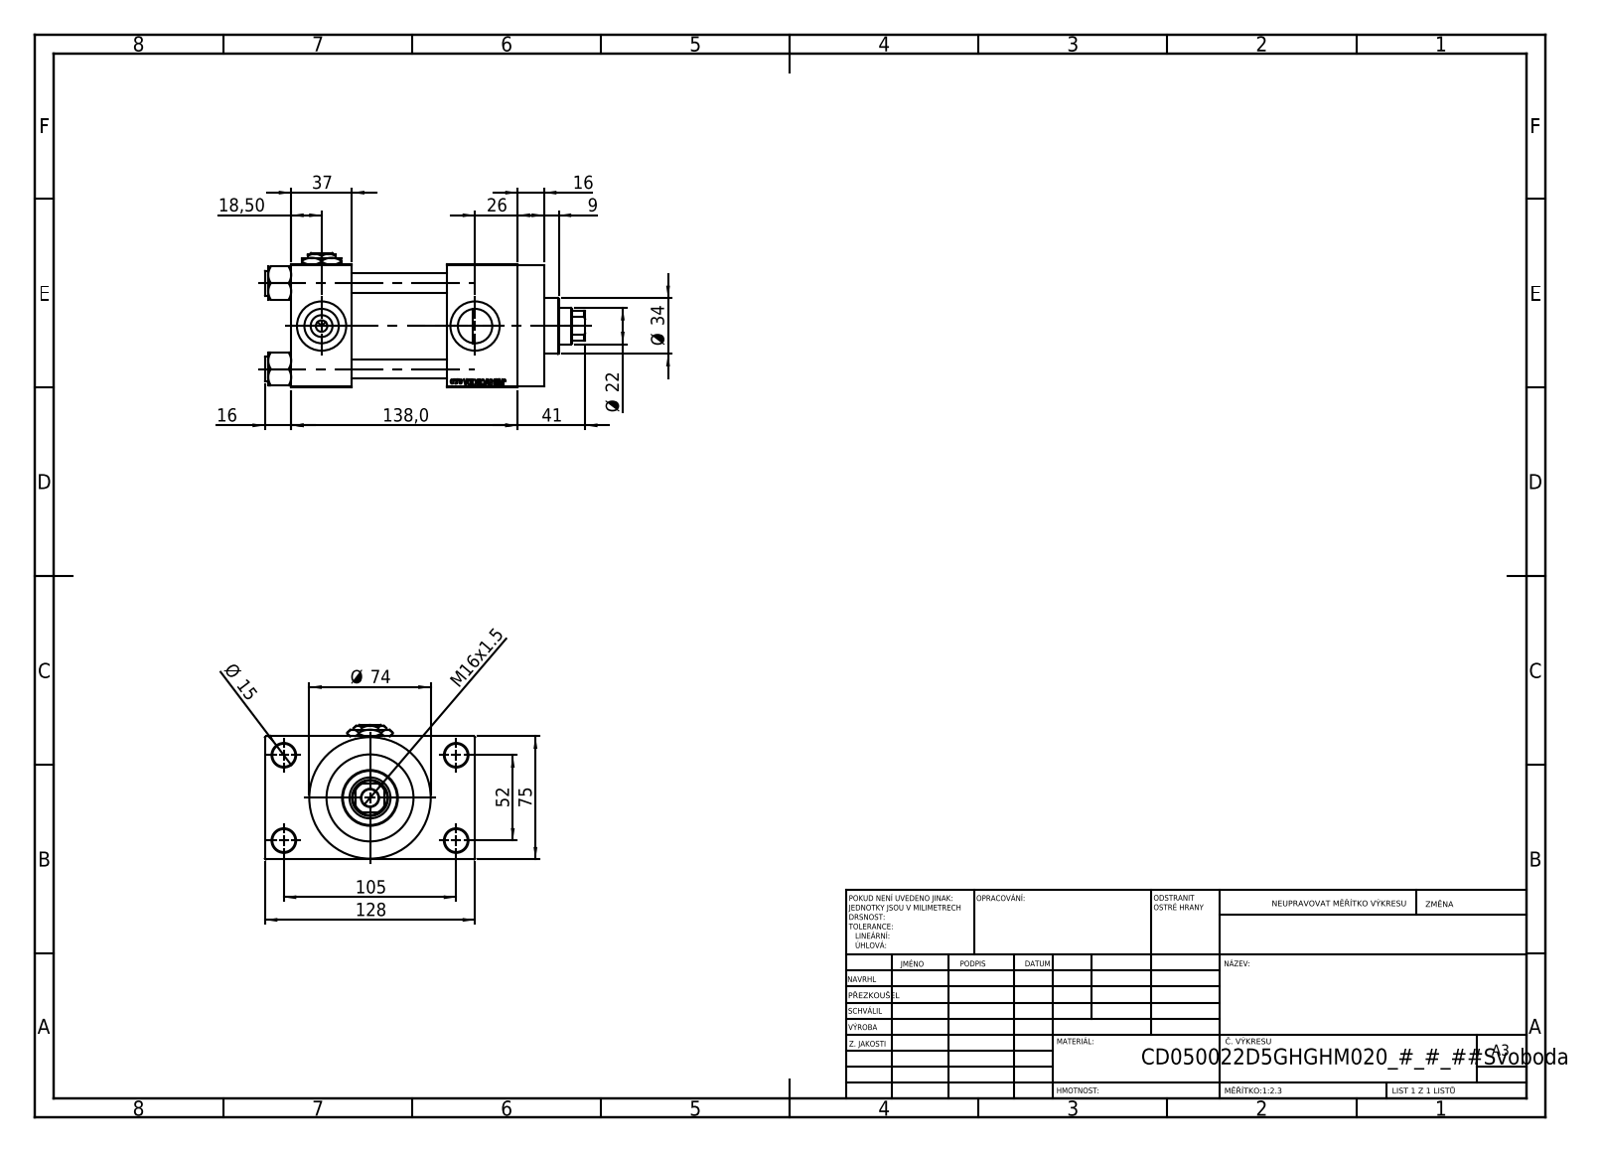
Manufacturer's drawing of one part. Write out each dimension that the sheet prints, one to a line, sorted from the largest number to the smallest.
138,0
128
105
75
Ø 74
52
41
37
Ø 34
26
Ø 22
18,50
16
16
M16x1.5
Ø 15
9
